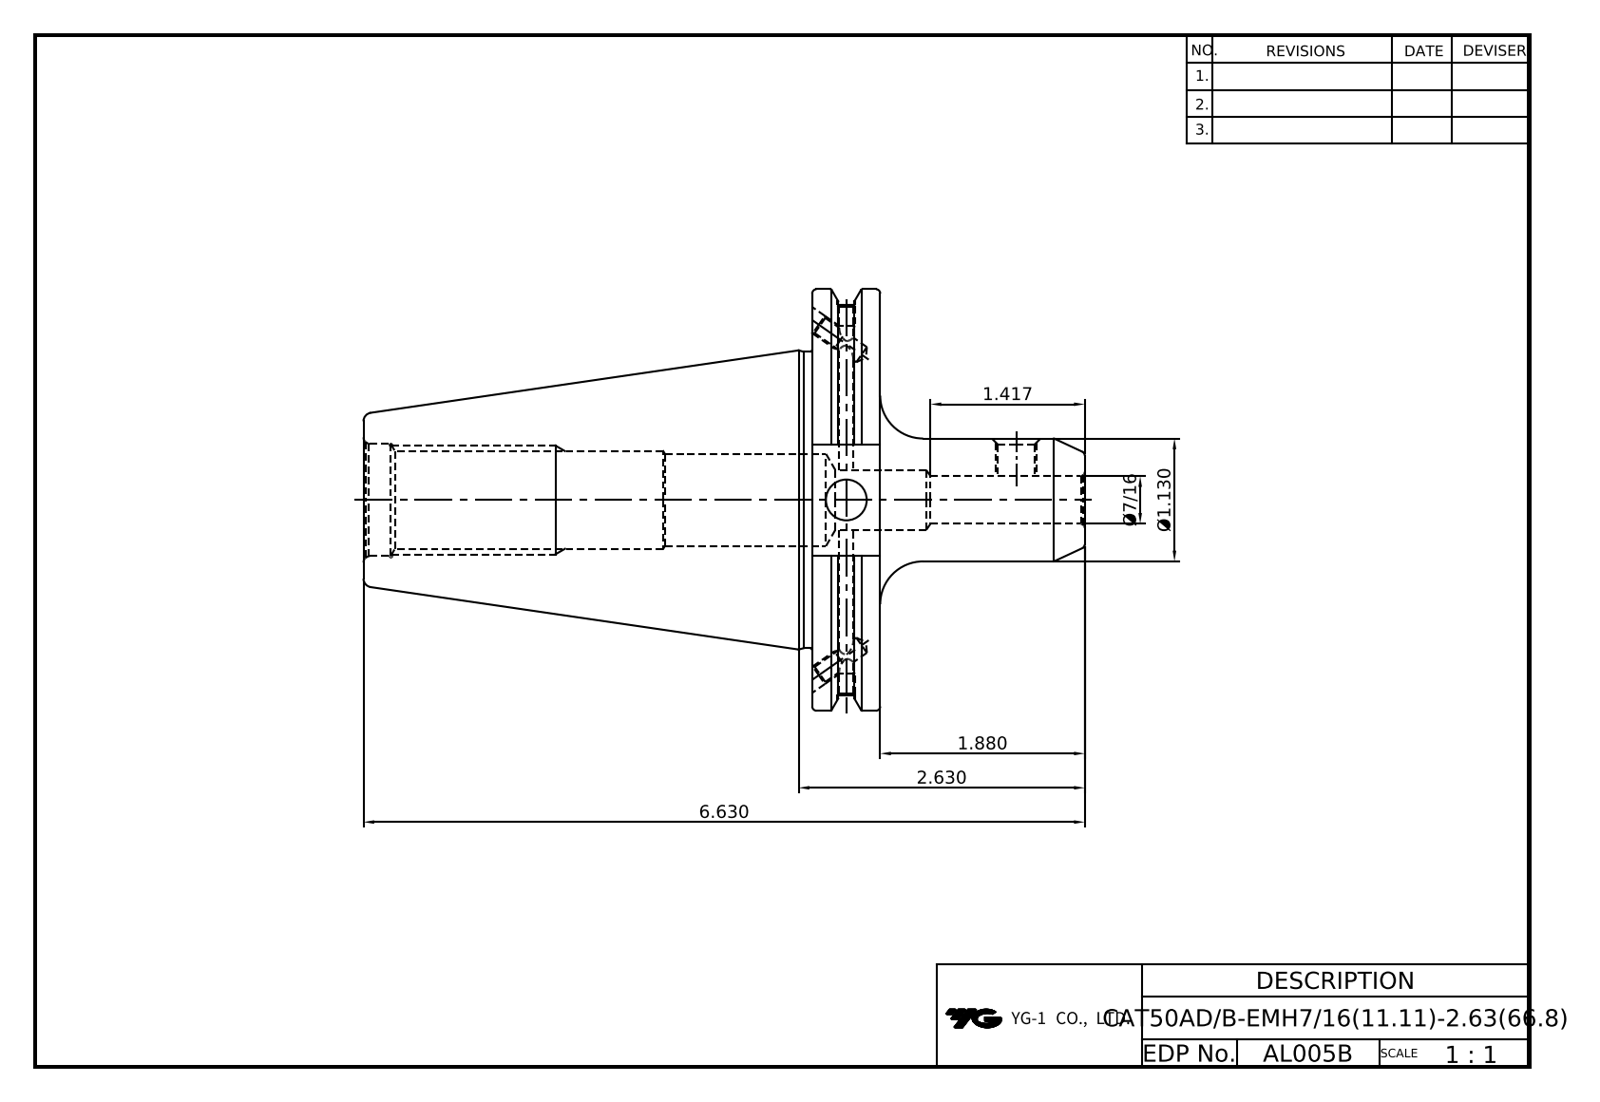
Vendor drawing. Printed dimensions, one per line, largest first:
6.630
2.630
1.880
1.417
Ø1.130
Ø7/16
